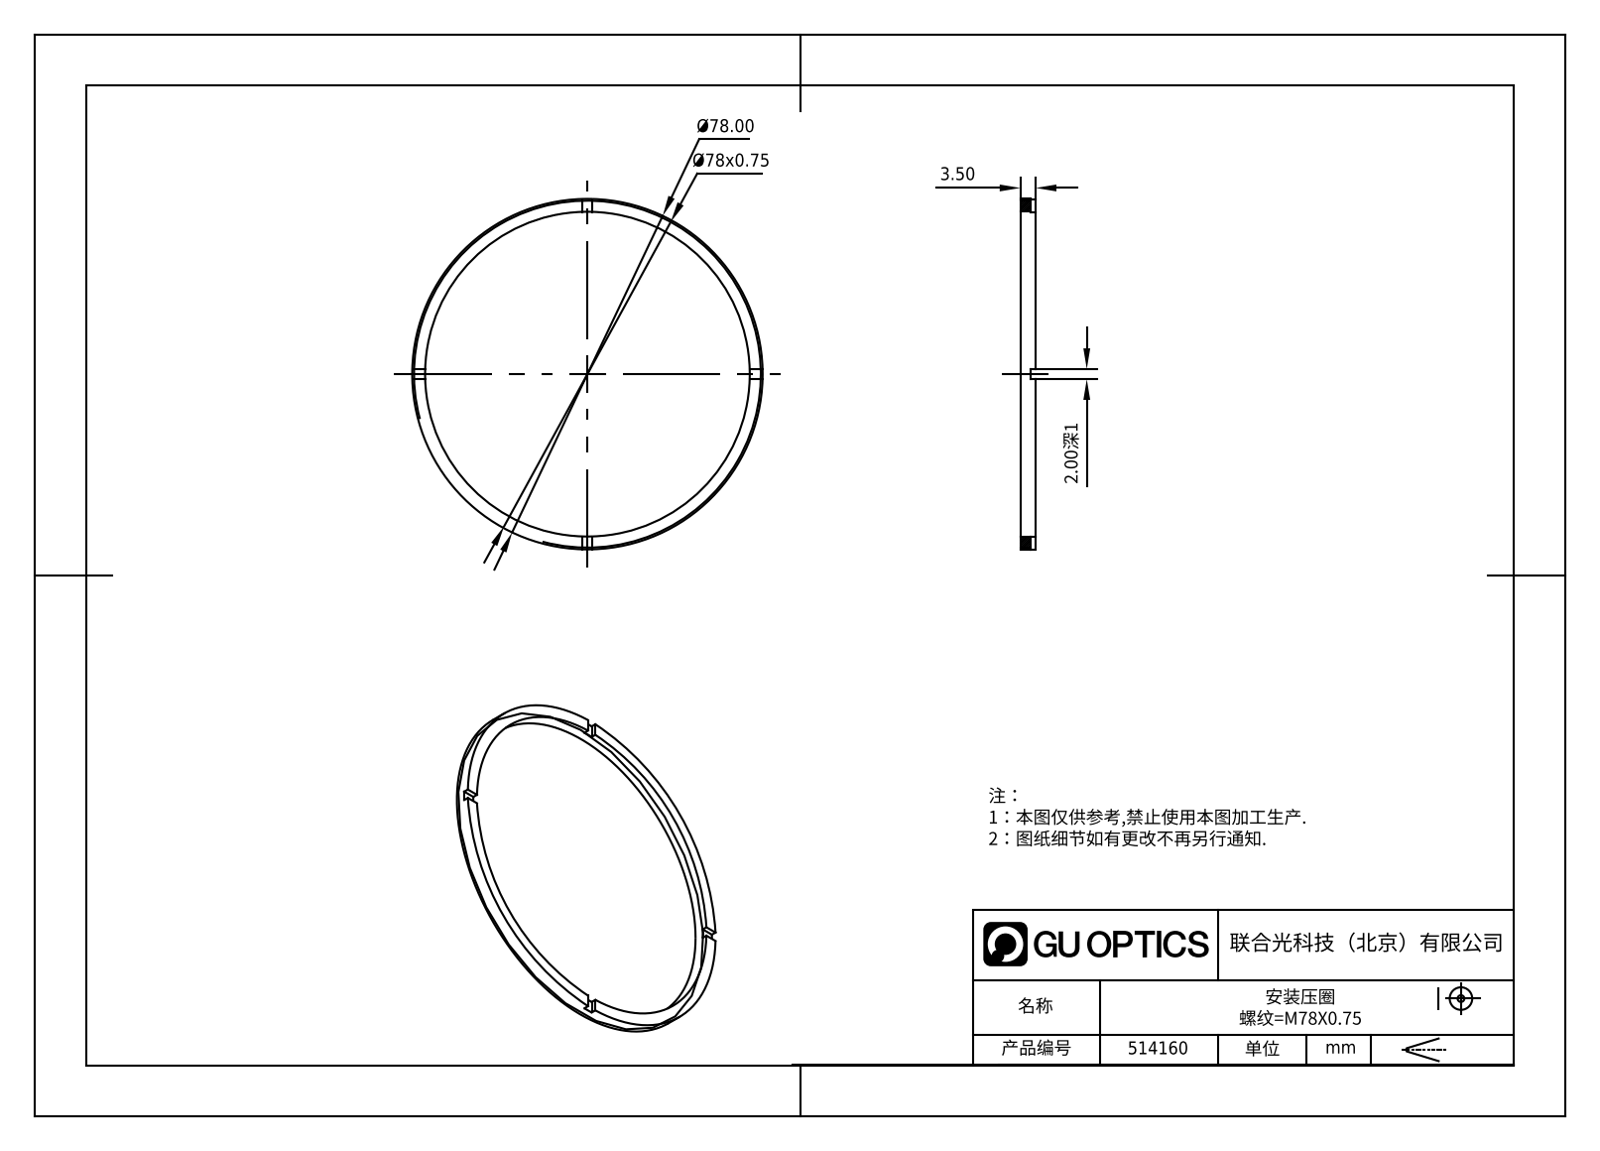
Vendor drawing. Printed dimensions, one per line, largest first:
Ø78.00
Ø78x0.75
3.50
2.00深1
